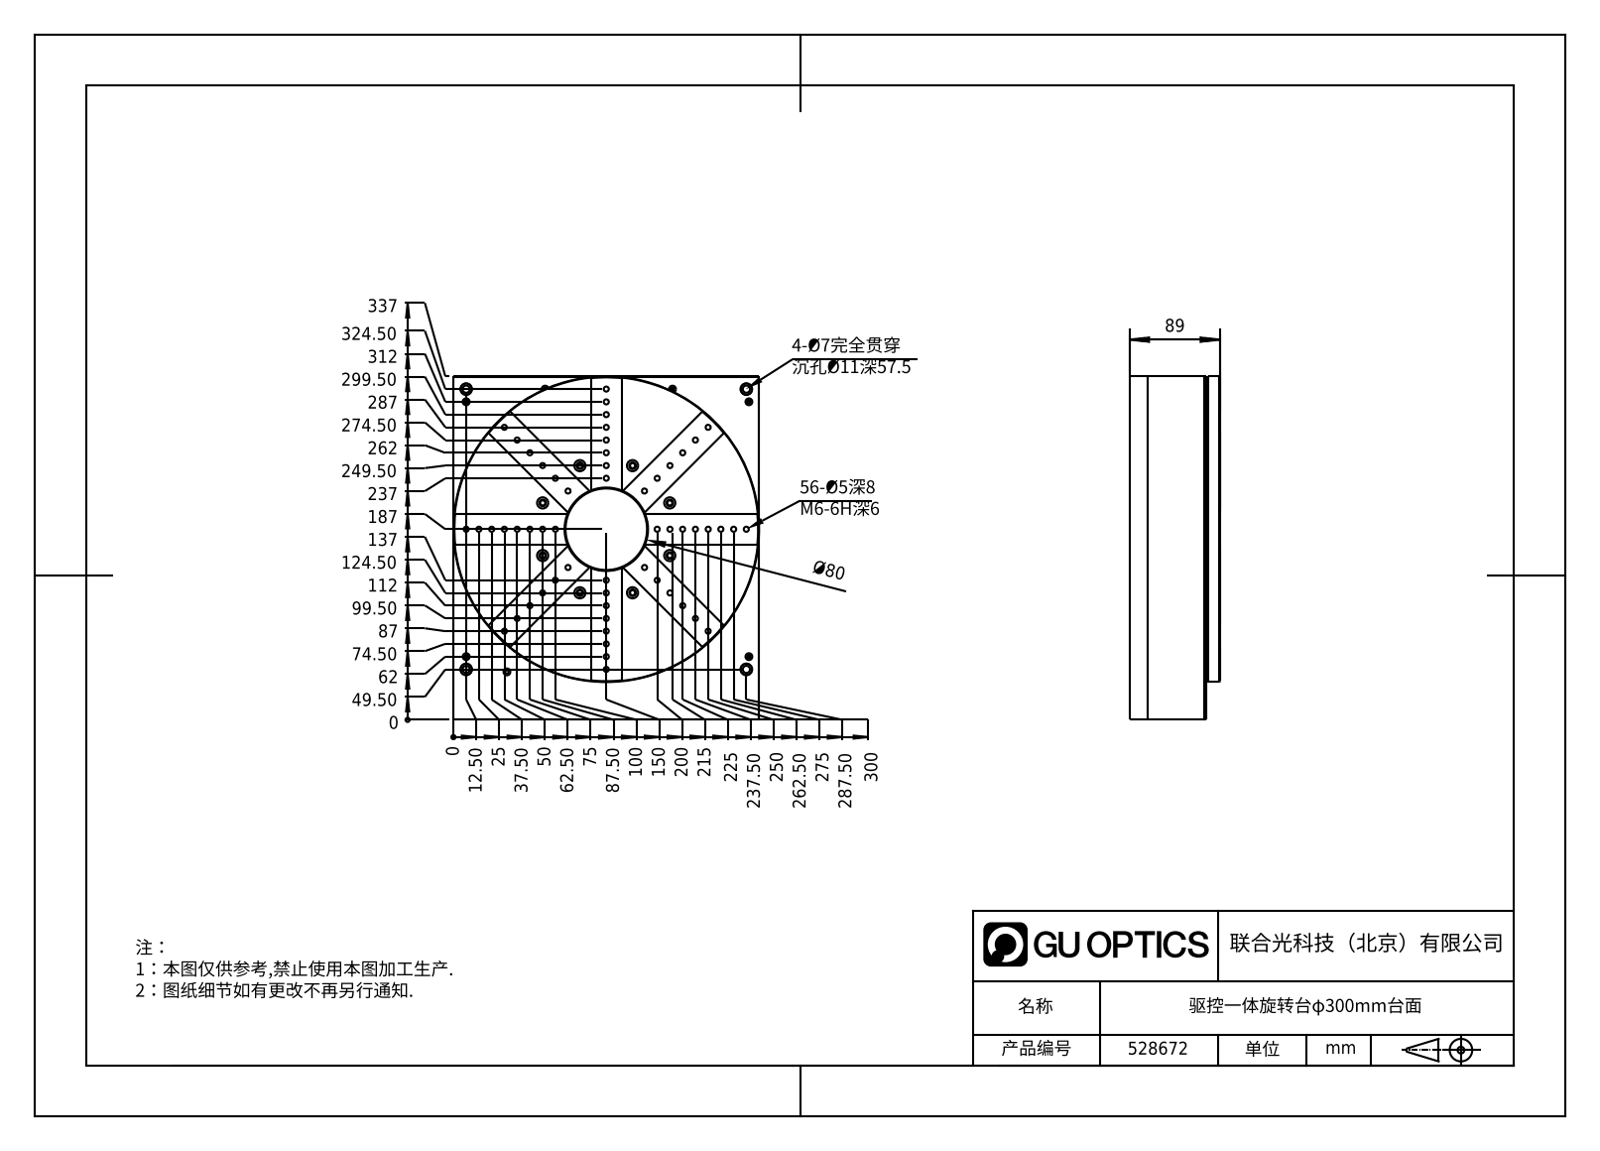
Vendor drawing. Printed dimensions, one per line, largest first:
89
Ø80
